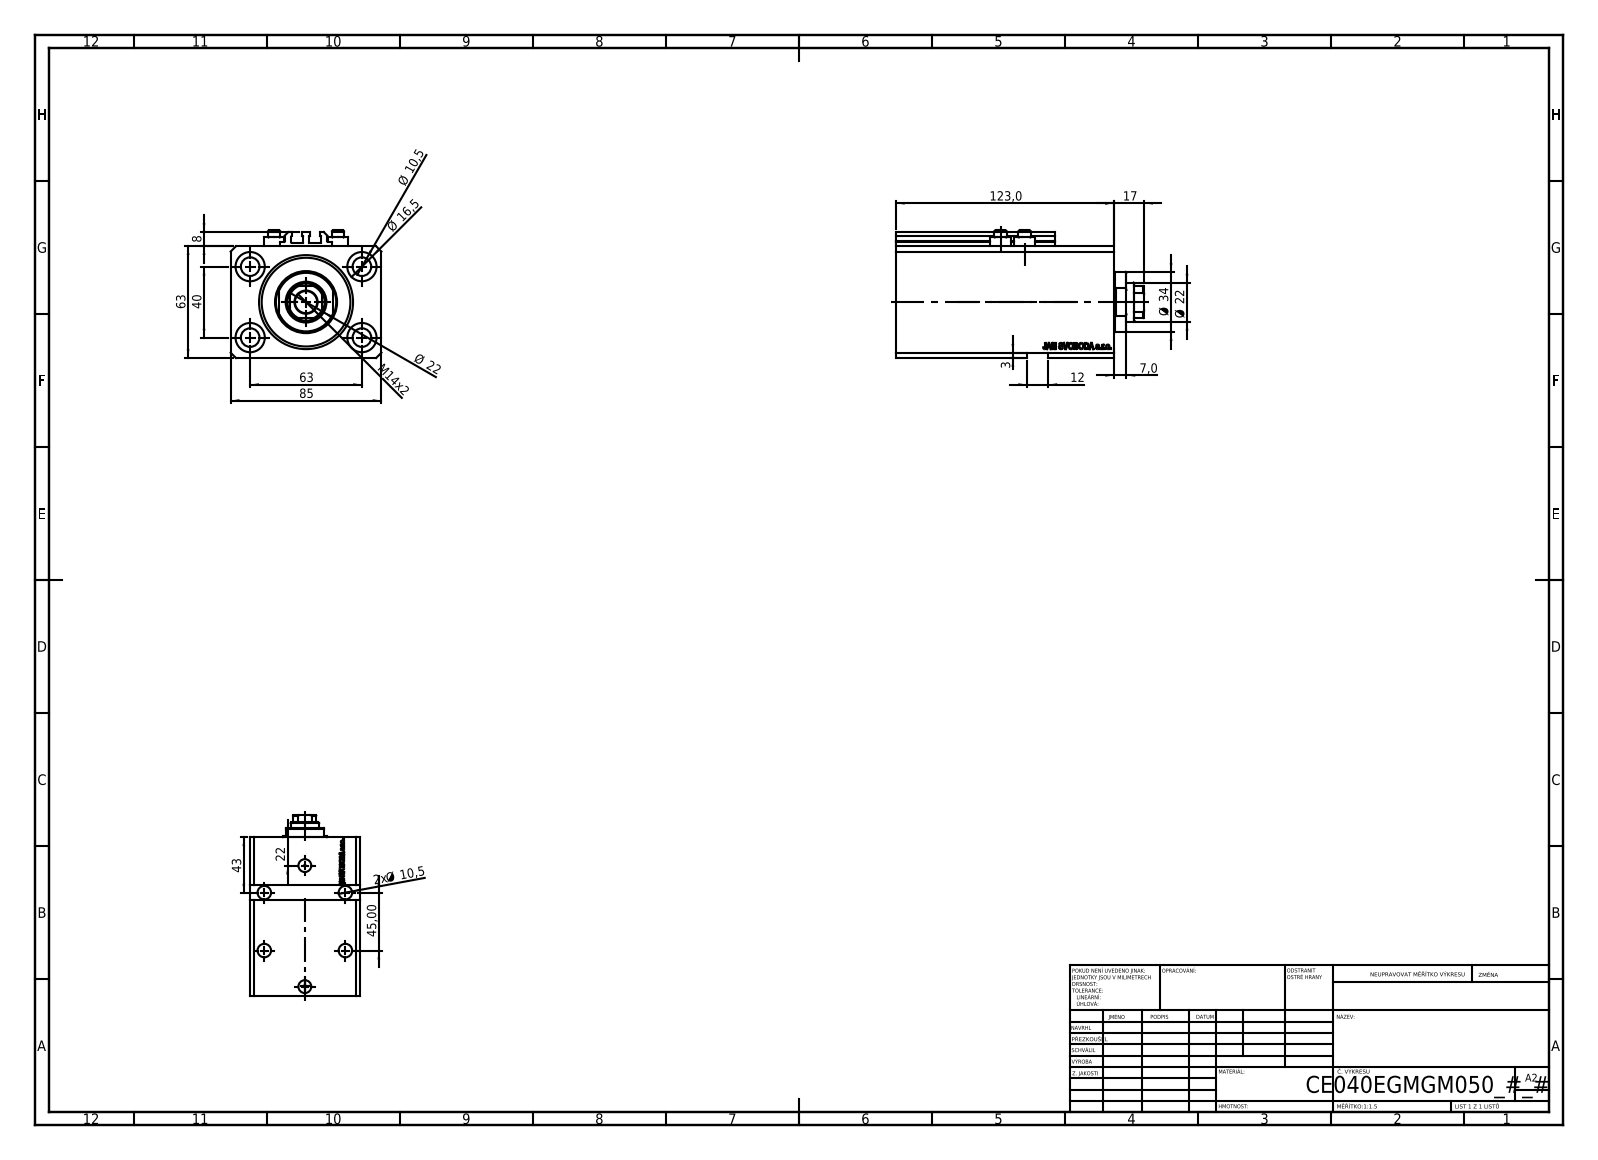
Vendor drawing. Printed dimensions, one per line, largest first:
123,0
85
63
63
45,00
43
40
Ø 34
Ø 22
Ø 22
22
17
Ø 16,5
M14x2
12
Ø 10,5
2x Ø 10,5
8
7,0
3
